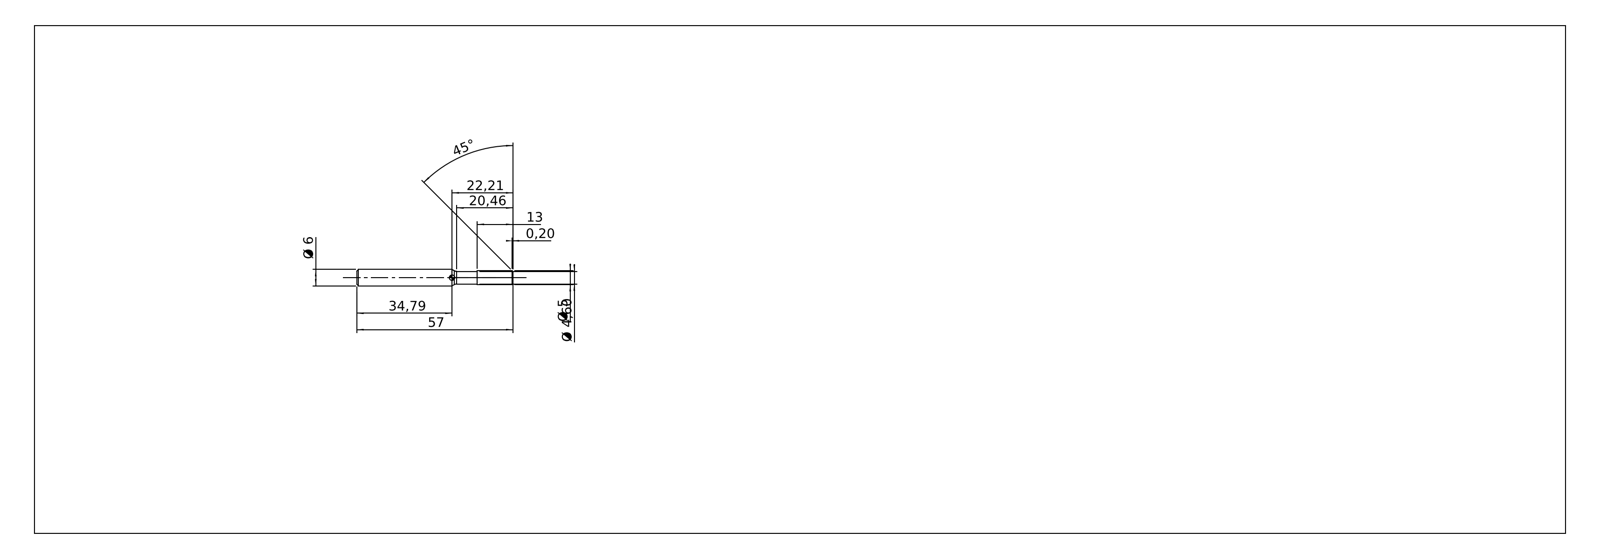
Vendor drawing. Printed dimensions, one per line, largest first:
57
45°
34,79
22,21
20,46
13
Ø 6
Ø 5
Ø 4,60
0,20
